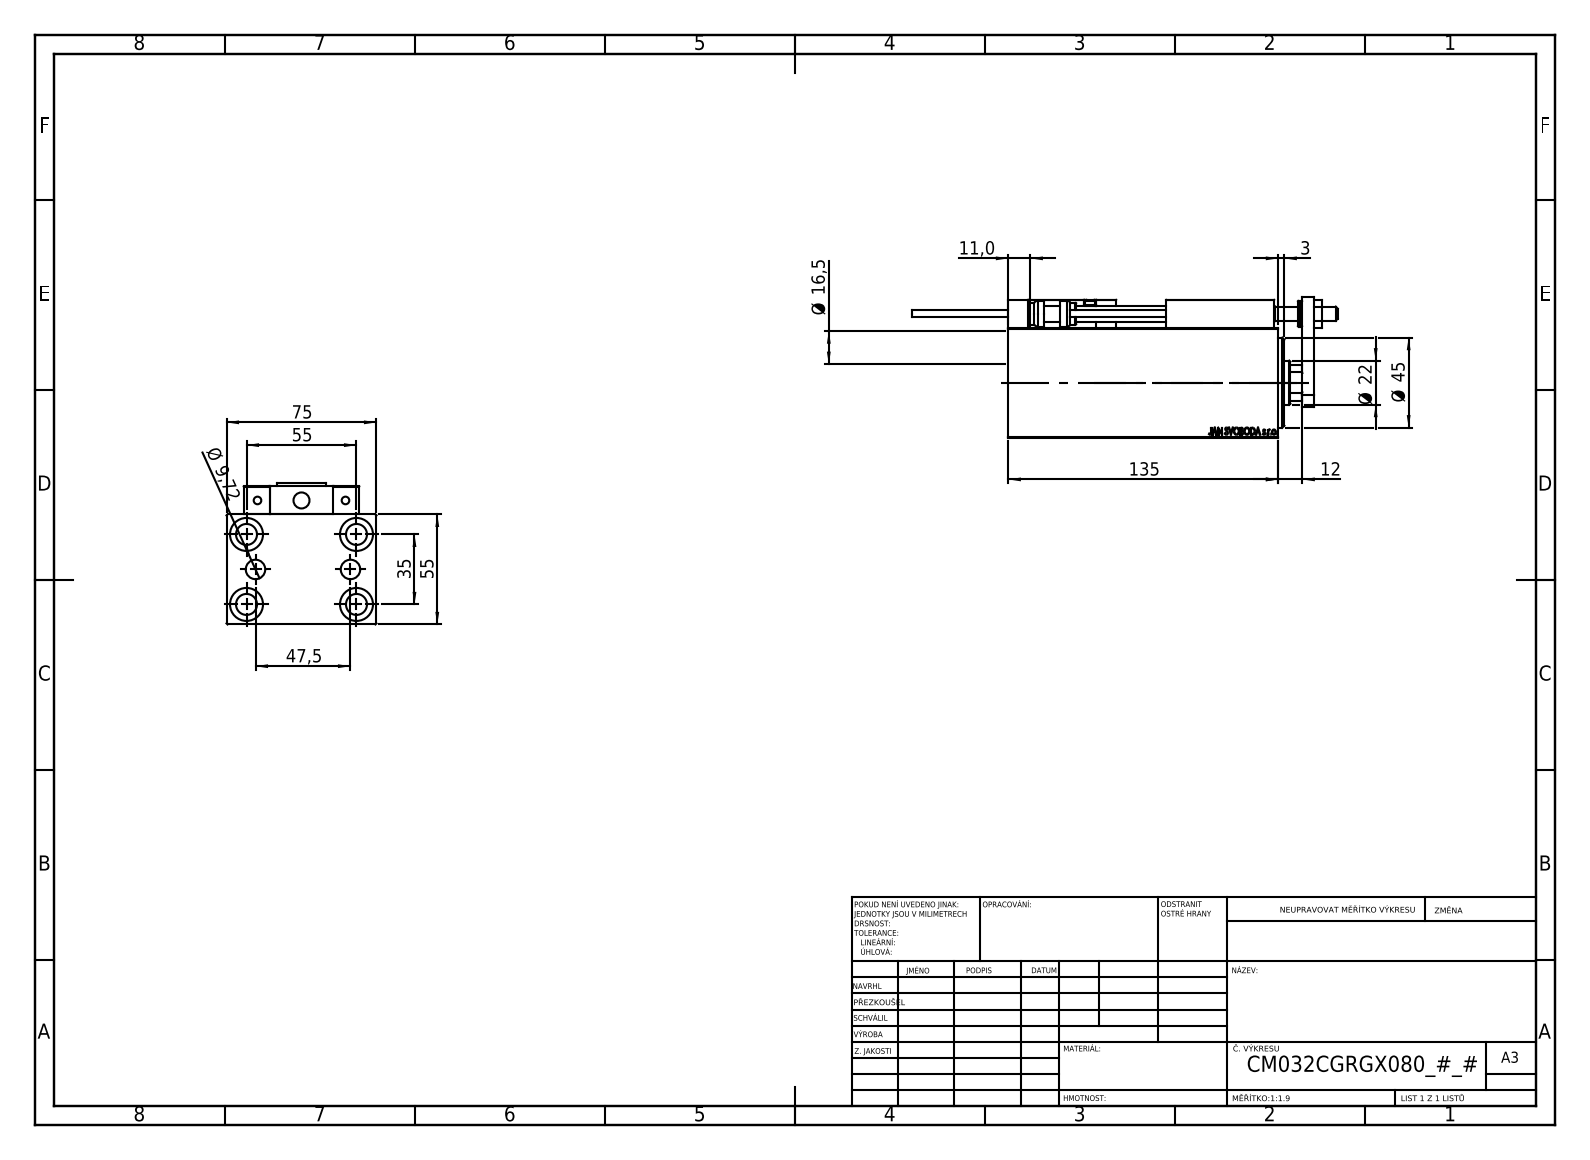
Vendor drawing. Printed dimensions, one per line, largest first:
135
75
55
55
47,5
Ø 45
35
Ø 22
Ø 16,5
12
11,0
Ø 9,72
3
